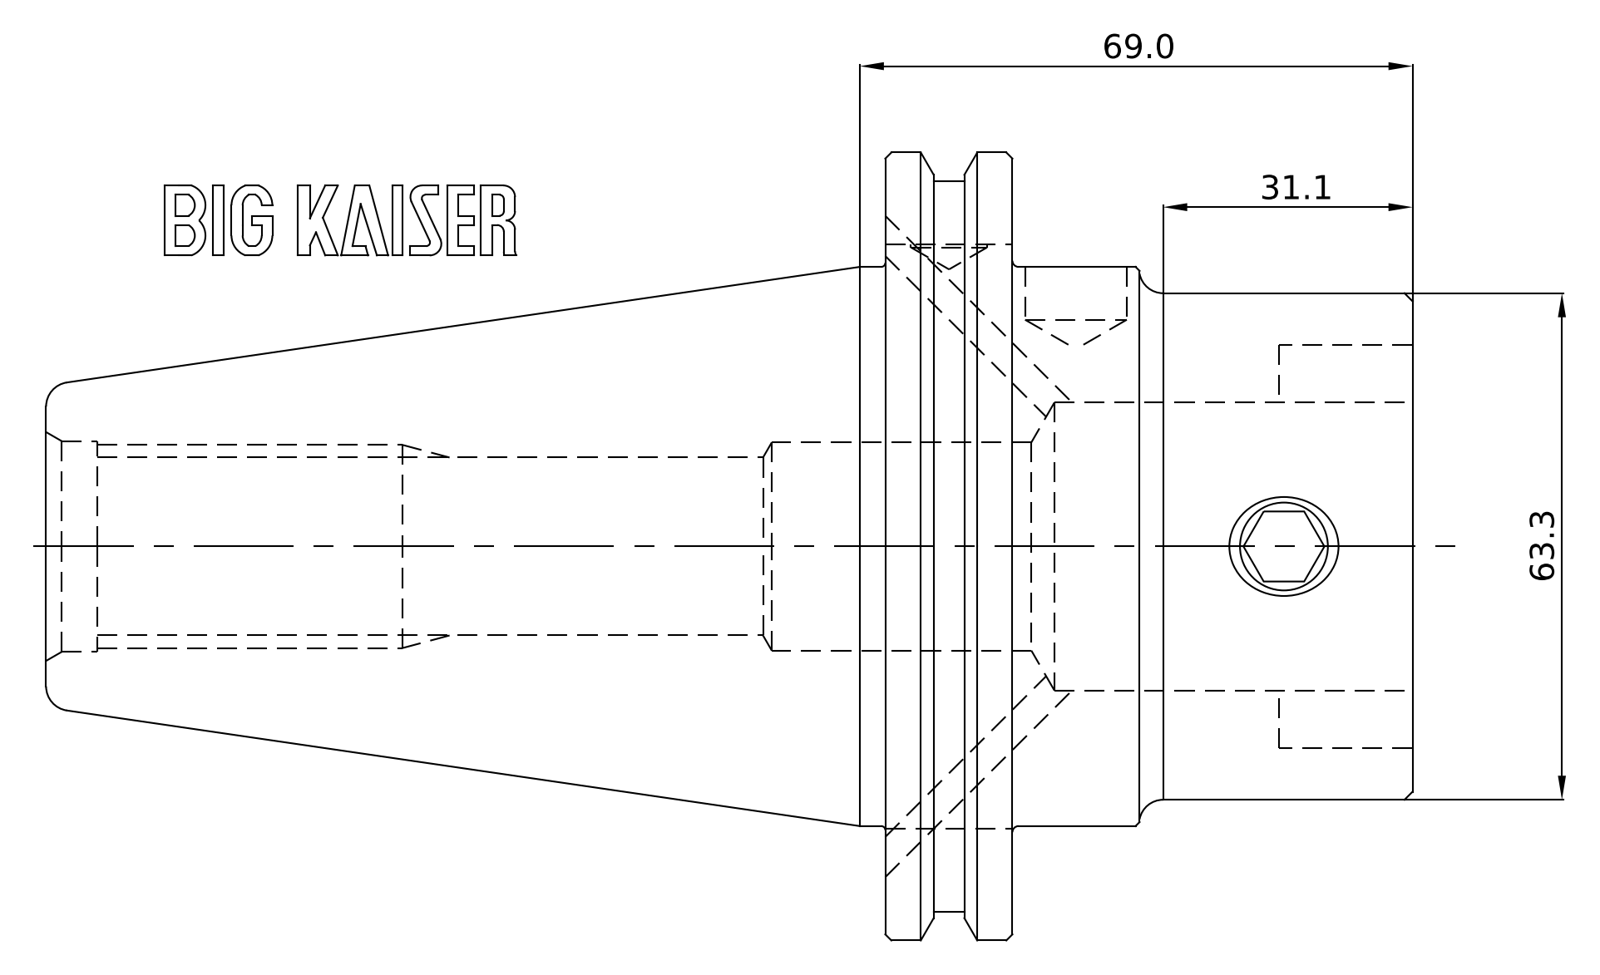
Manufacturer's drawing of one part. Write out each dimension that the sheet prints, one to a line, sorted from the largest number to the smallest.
69.0
63.3
31.1
